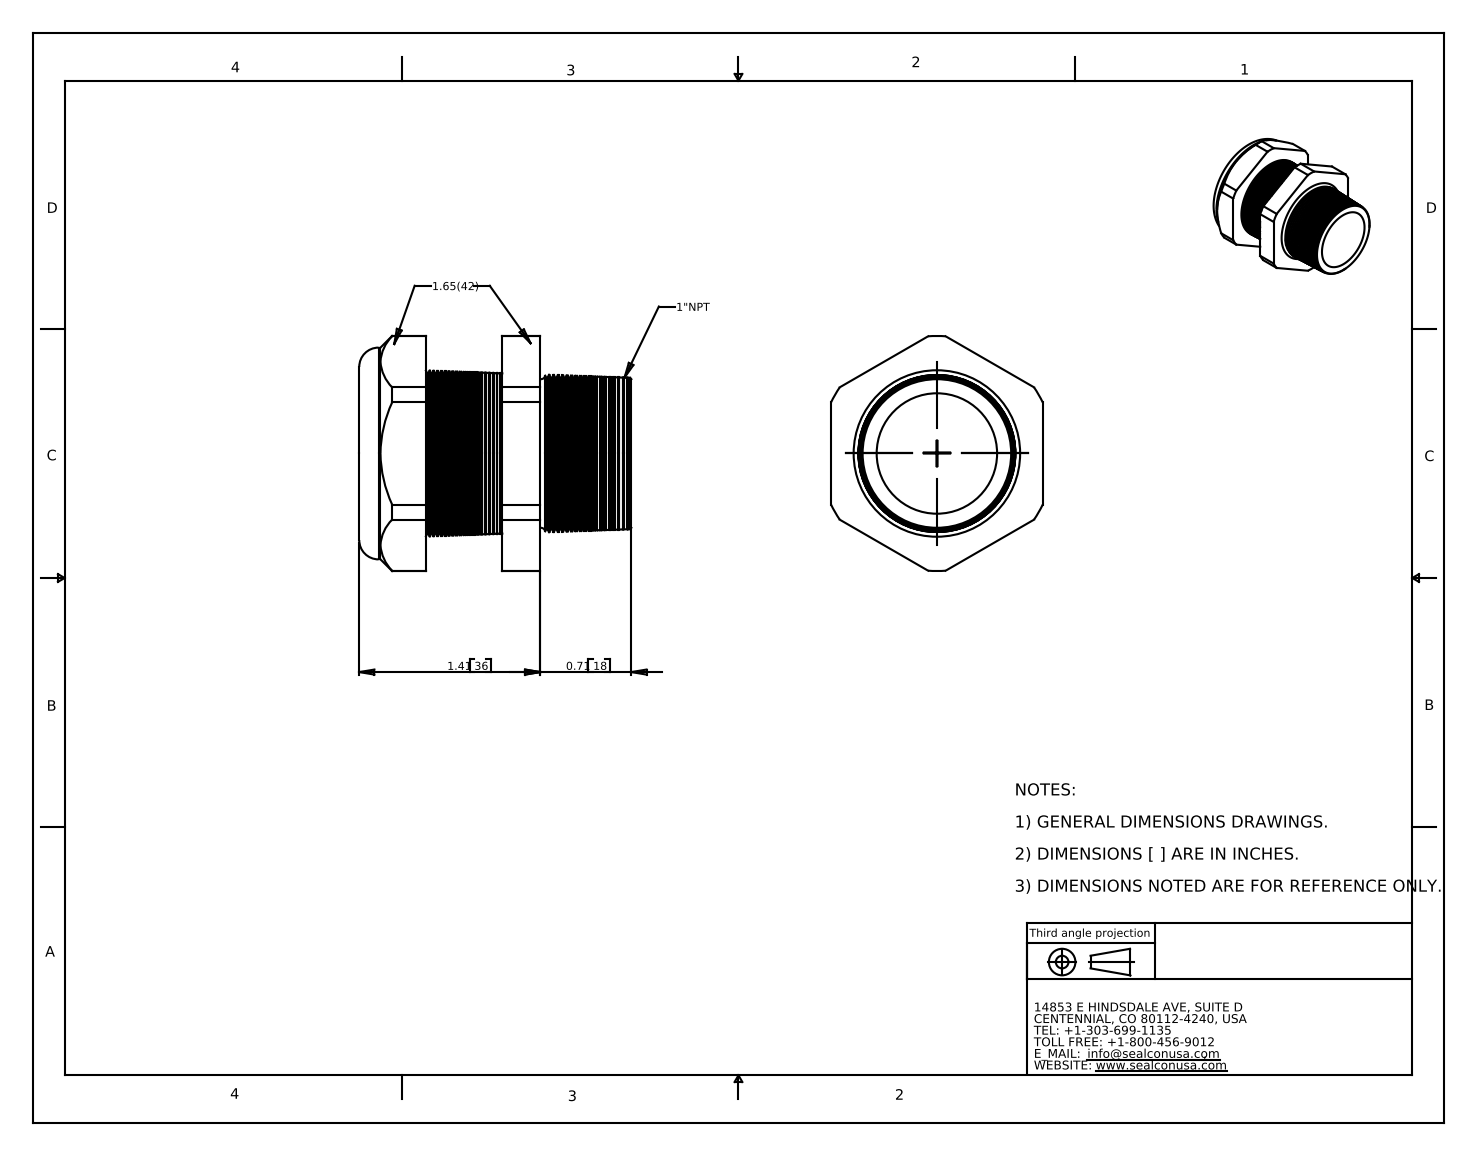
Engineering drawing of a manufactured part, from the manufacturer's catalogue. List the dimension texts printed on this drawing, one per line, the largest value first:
1.41 36
0.71 18
